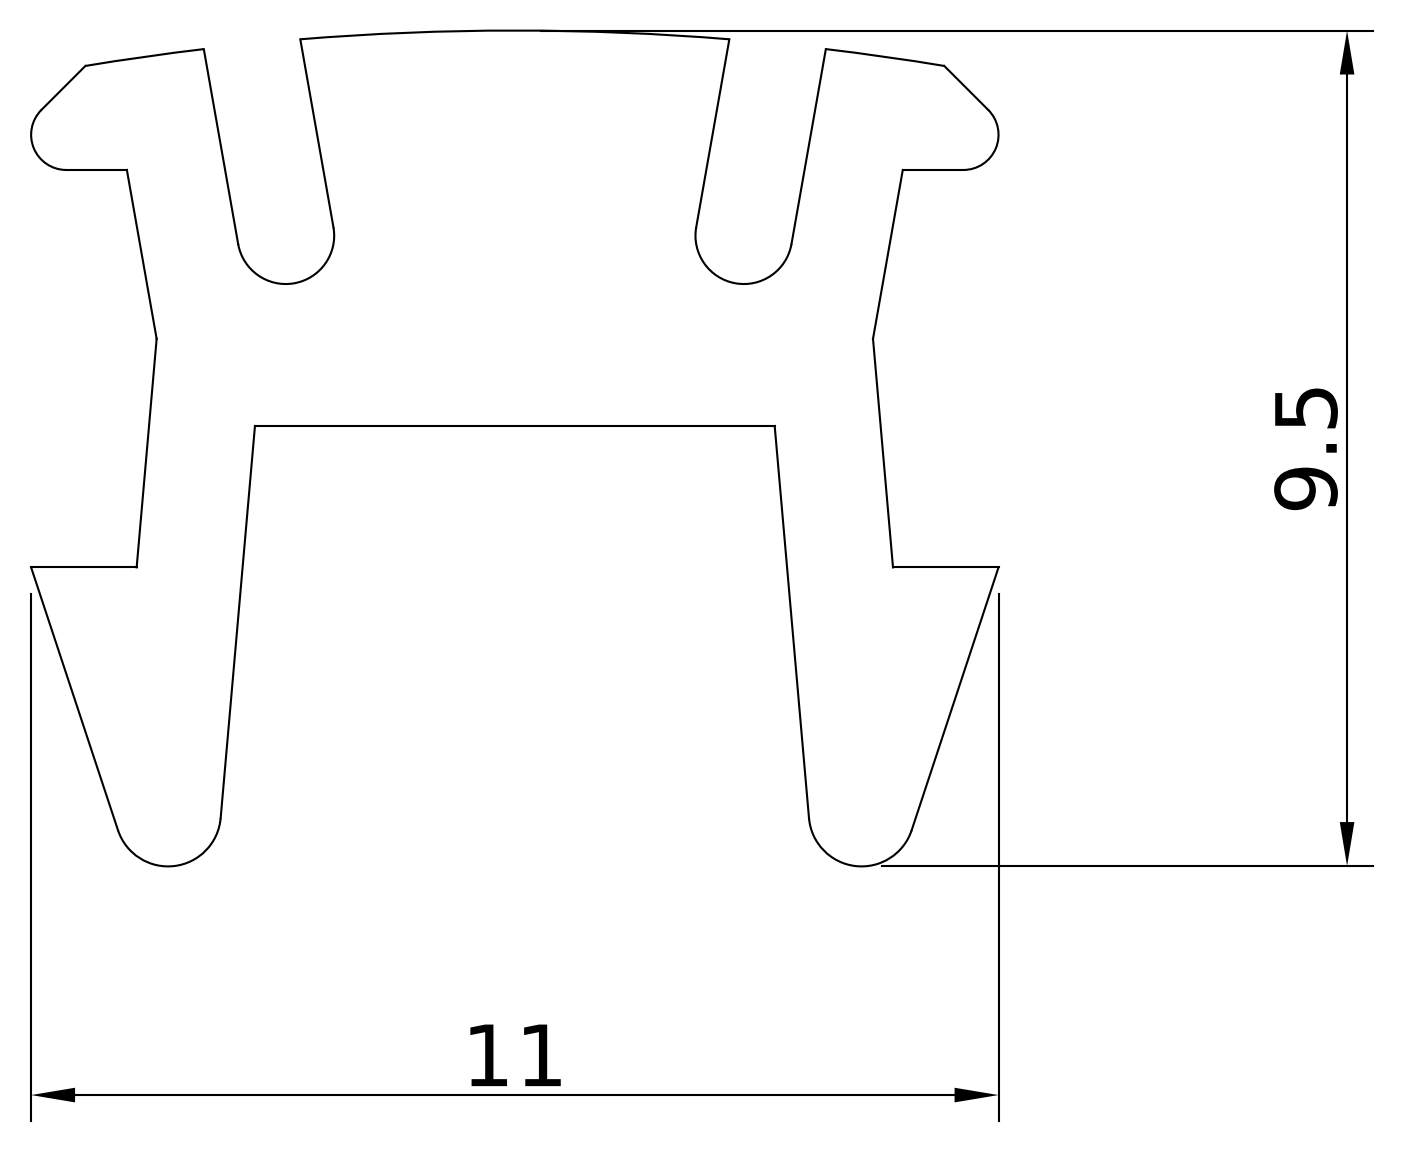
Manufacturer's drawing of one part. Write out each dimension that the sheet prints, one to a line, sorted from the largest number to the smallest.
11
9.5
